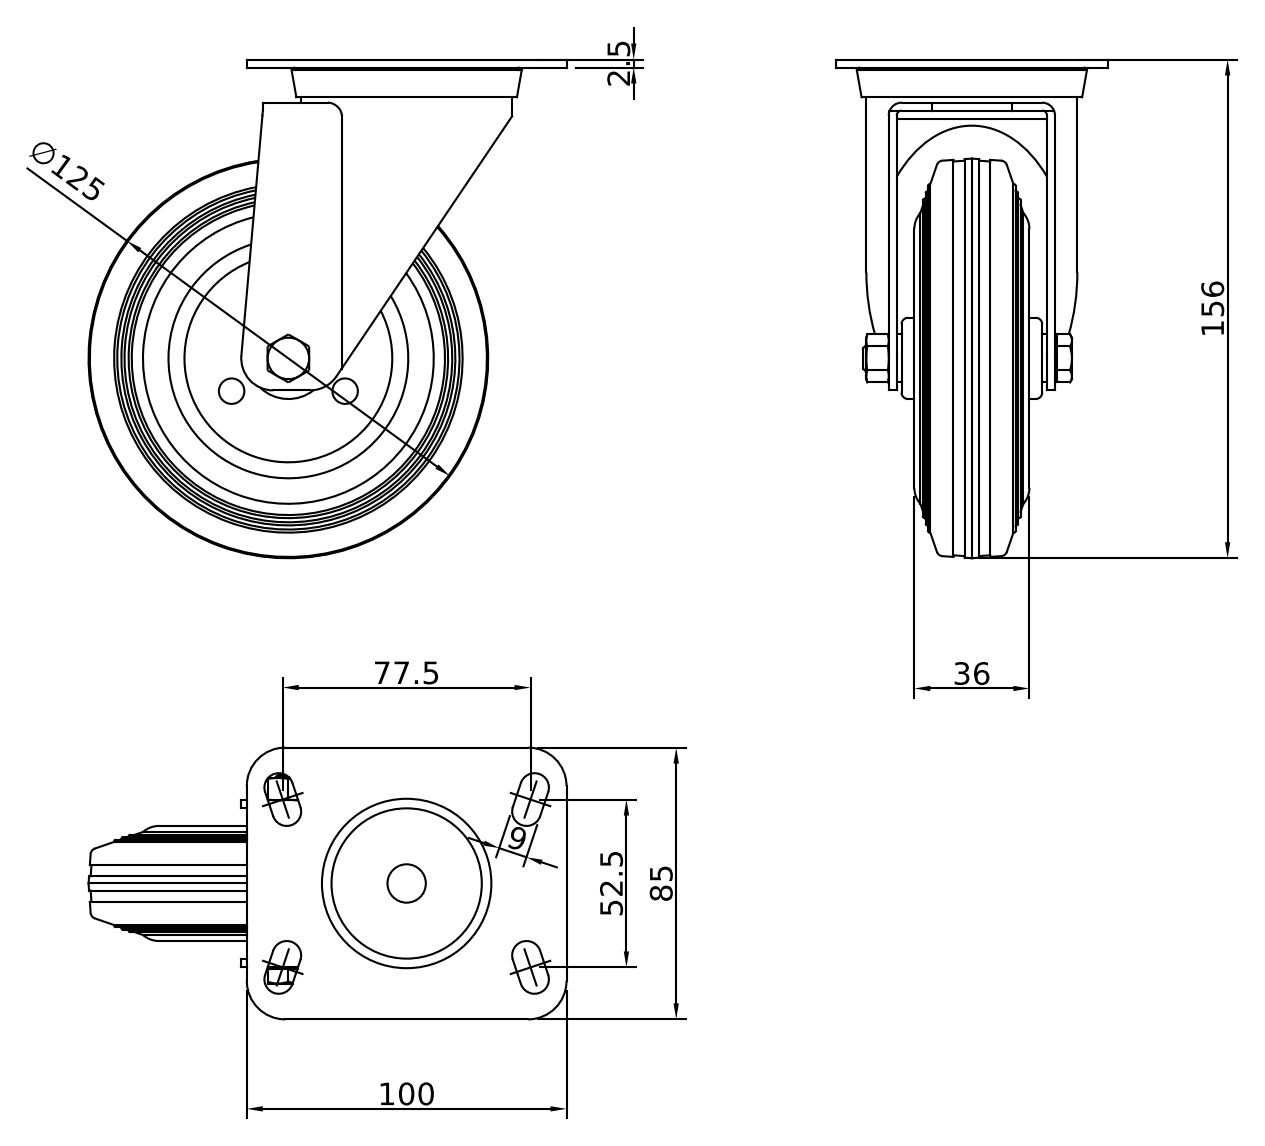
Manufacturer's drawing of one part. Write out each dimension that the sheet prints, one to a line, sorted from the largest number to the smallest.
156
∅125
100
85
77.5
52.5
36
9
2.5
